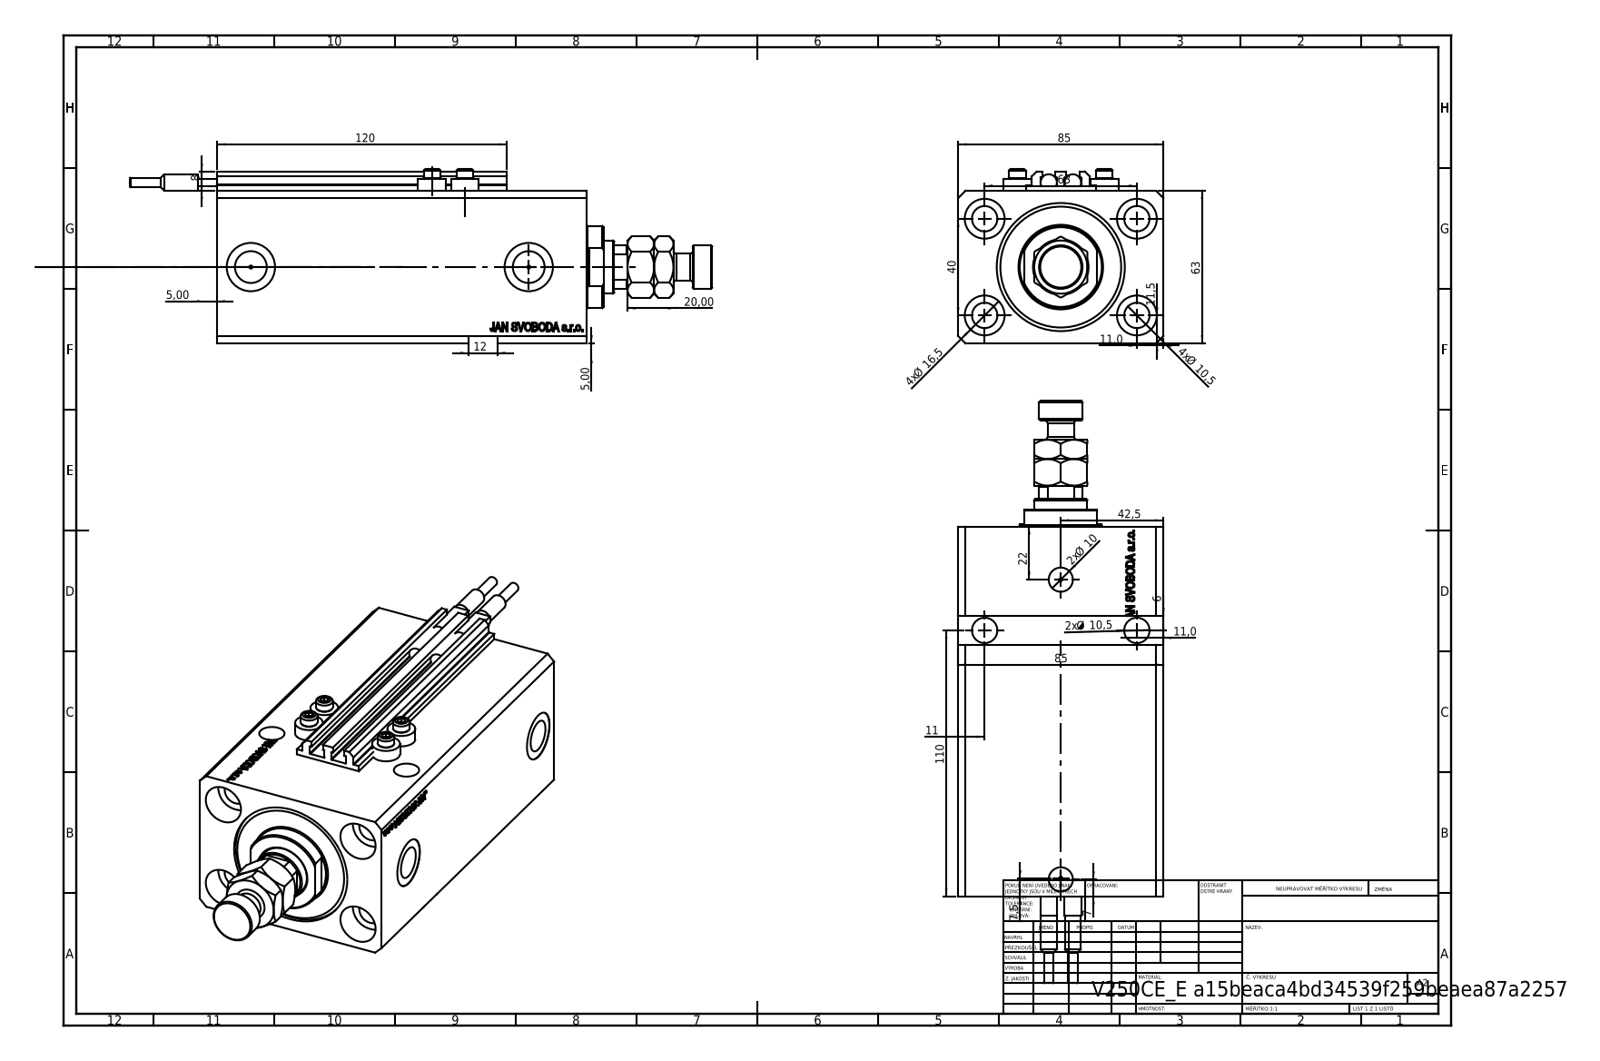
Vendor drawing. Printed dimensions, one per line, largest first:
120
110
85
85
63
63
42,5
40
22
20,00
4x Ø 16,5
12
11,5
11,0
11,0
11
4x Ø 10,5
2x Ø 10,5
2x Ø 10
8
7,5
7
6
5,00
5,00
